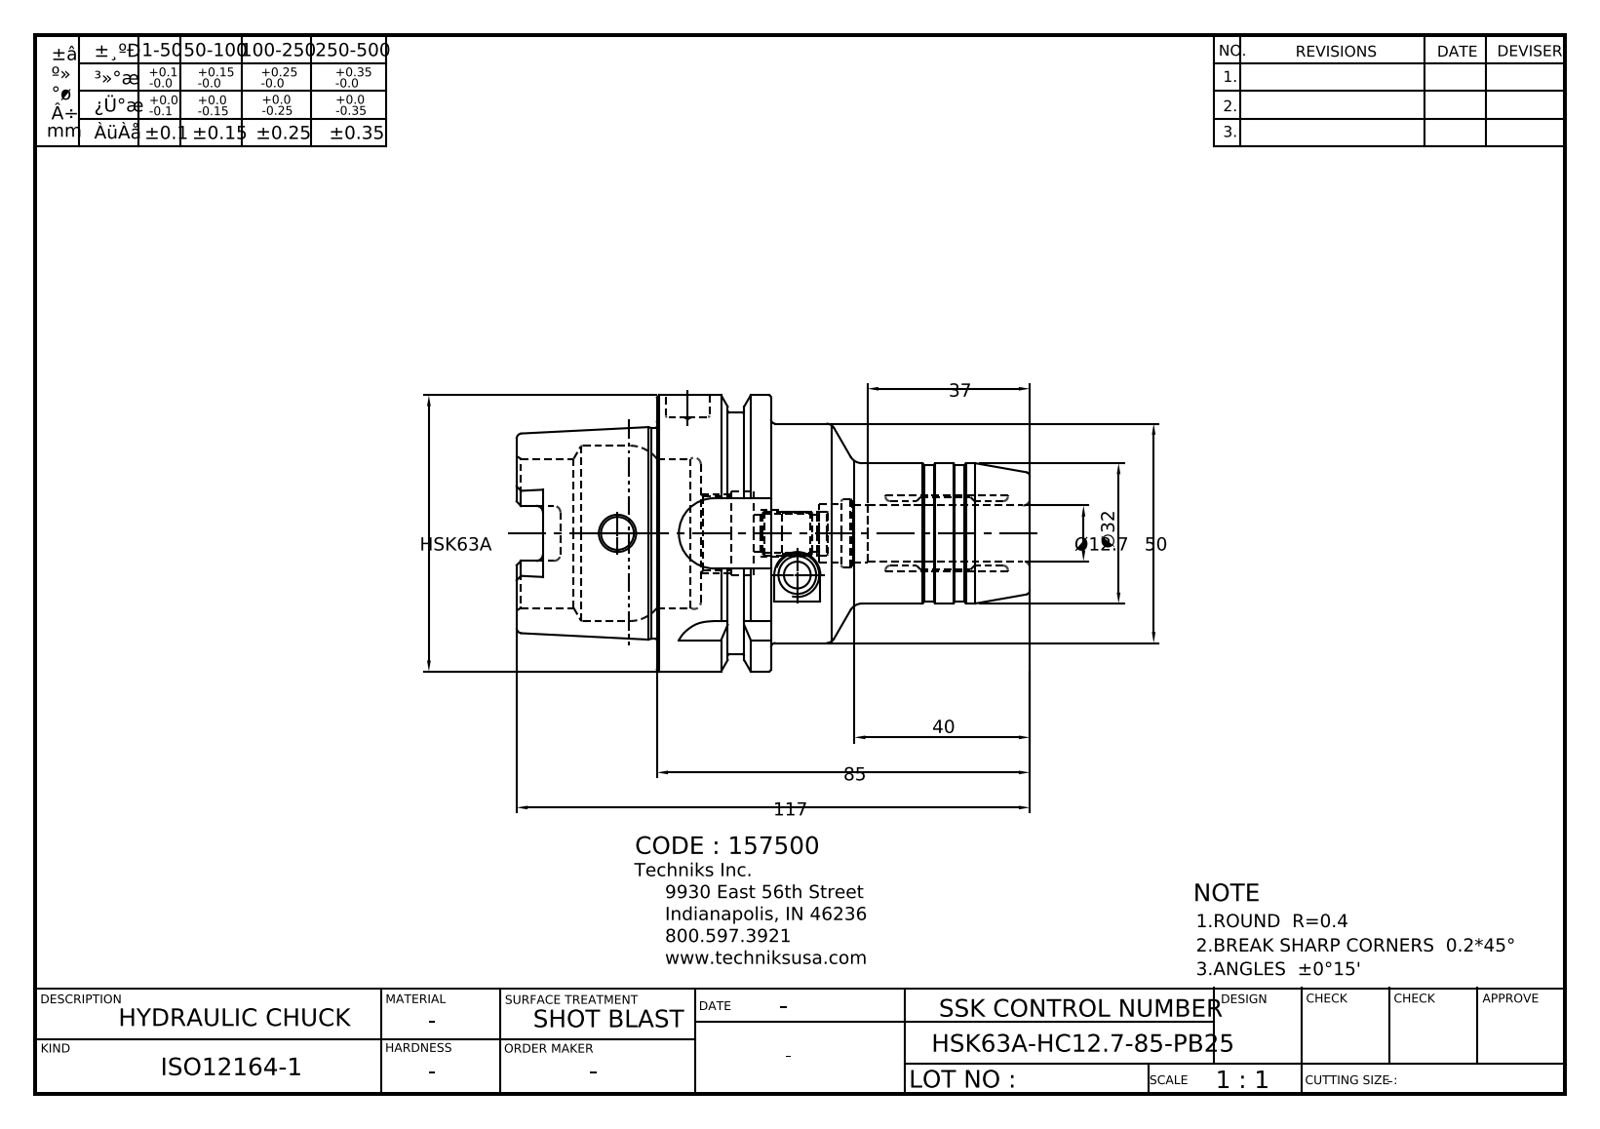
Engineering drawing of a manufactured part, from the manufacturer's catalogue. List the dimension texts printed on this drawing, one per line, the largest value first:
117
85
HSK63A
50
40.00000000
37
32.00000000
Ø12.7
